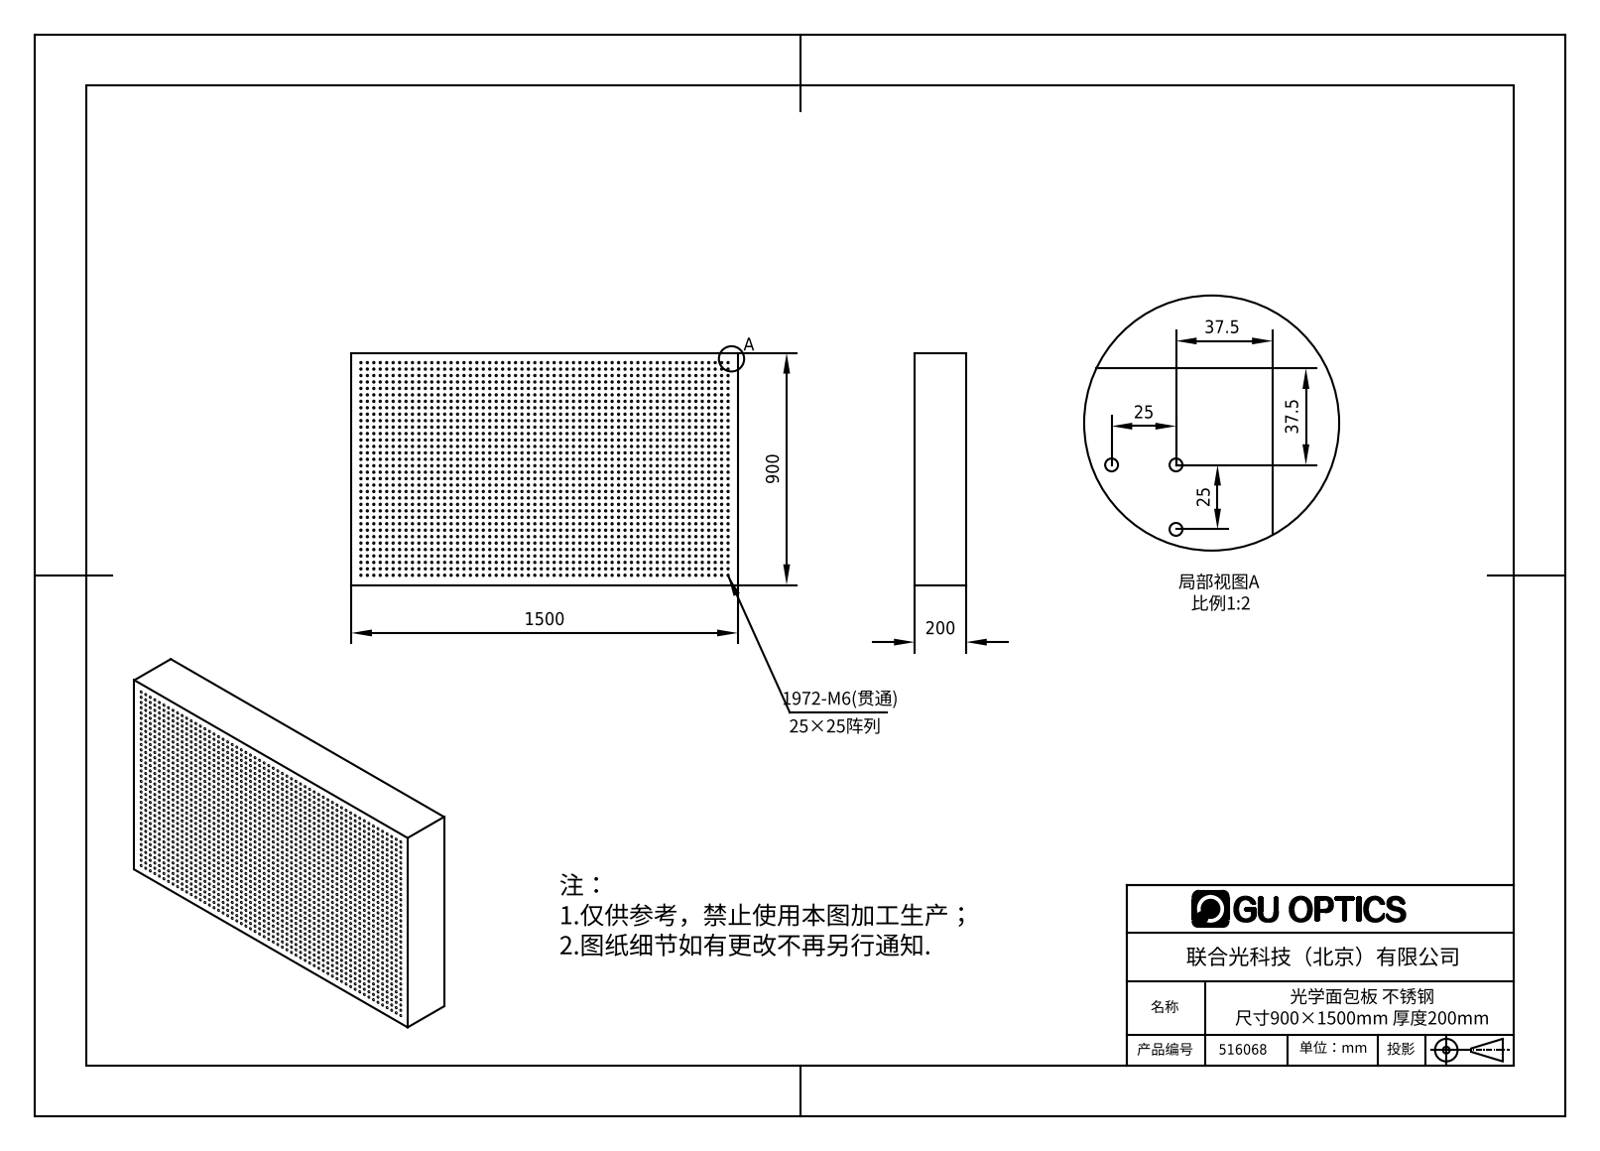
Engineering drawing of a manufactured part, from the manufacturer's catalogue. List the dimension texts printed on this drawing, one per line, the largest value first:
1500
900
200
37.5
37.5
25
25
